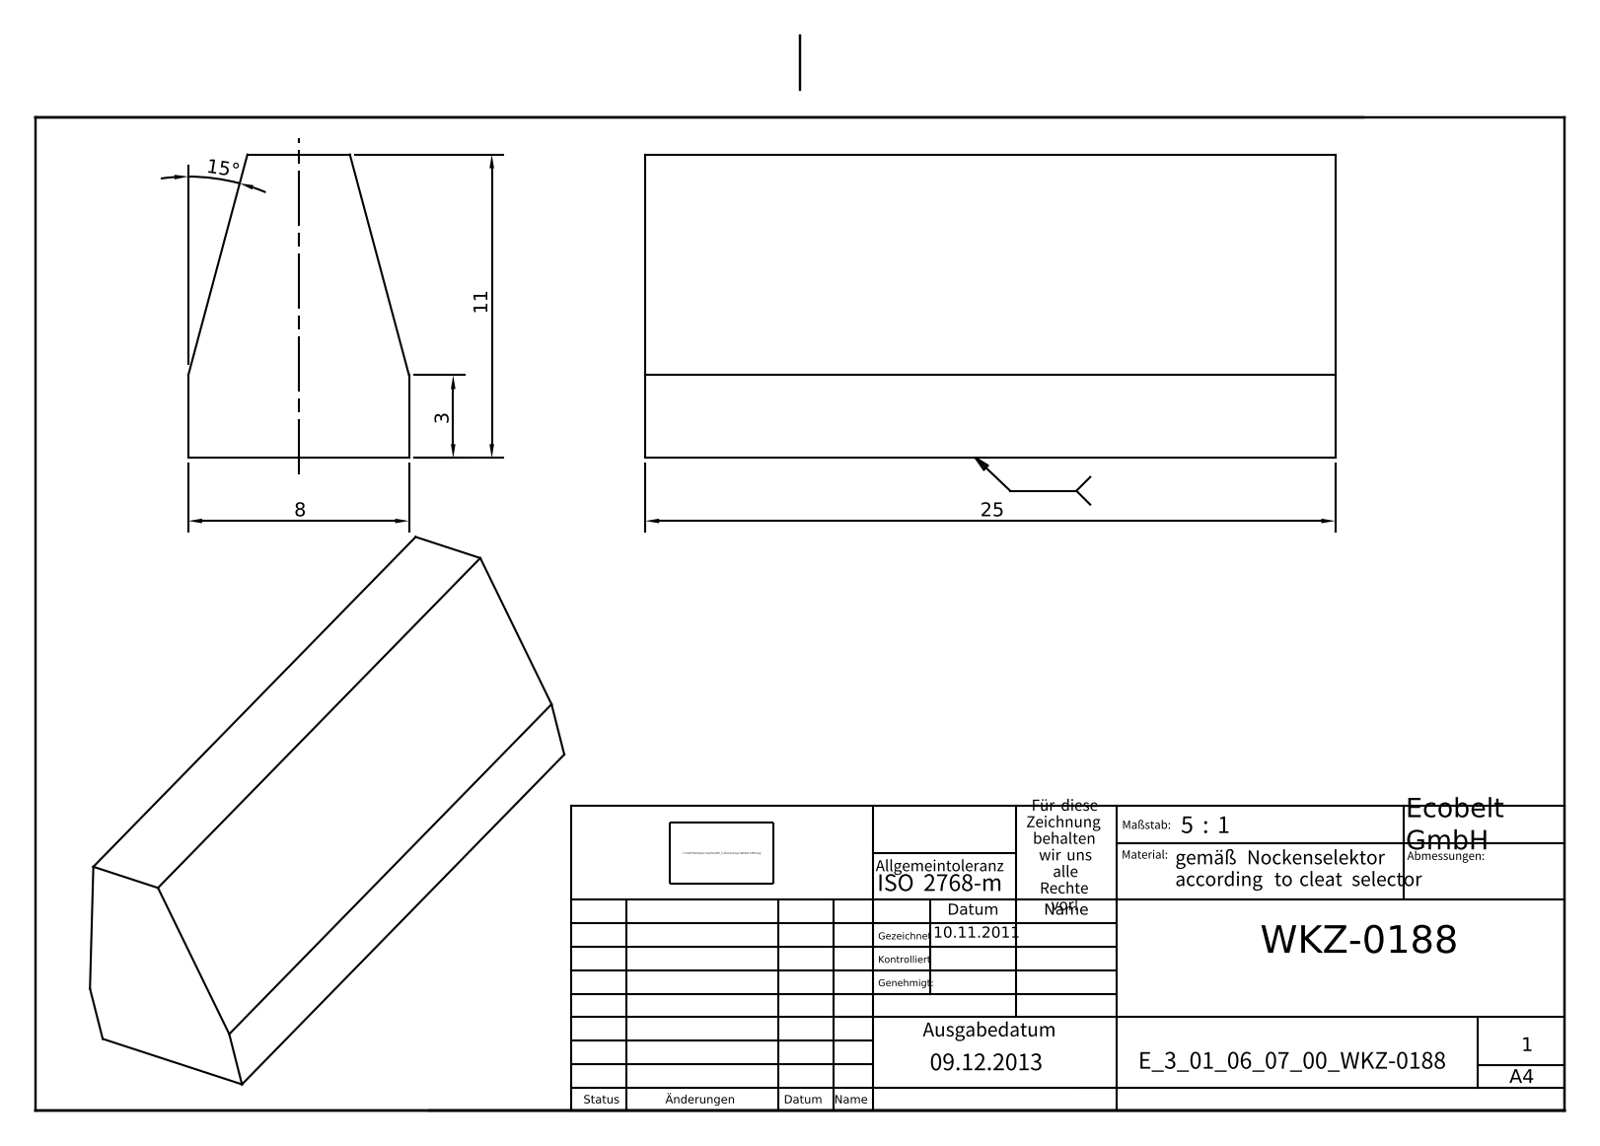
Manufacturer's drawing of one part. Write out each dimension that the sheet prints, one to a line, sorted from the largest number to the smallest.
25
15°
11
8
3
